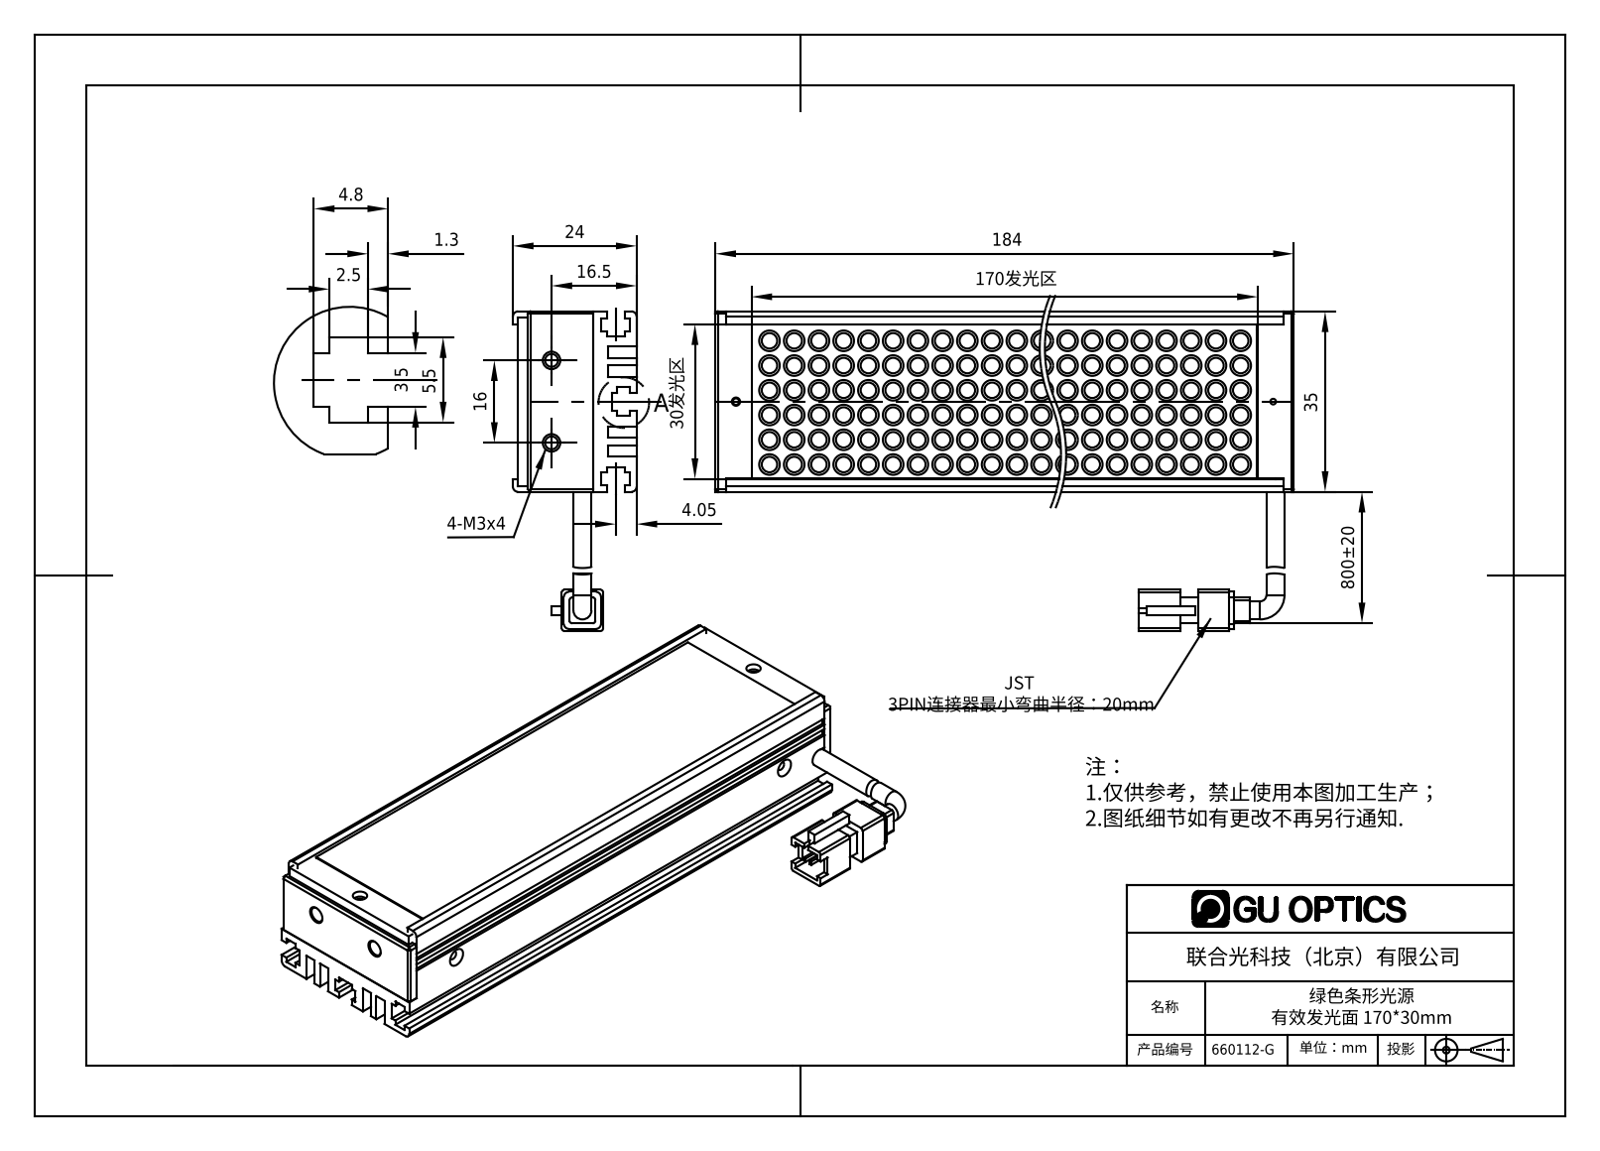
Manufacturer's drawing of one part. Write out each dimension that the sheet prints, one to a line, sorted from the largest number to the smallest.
800±20
184
170发光区
35
30发光区
24
16.5
16
5.5
4.8
4.05
3.5
2.5
1.3
